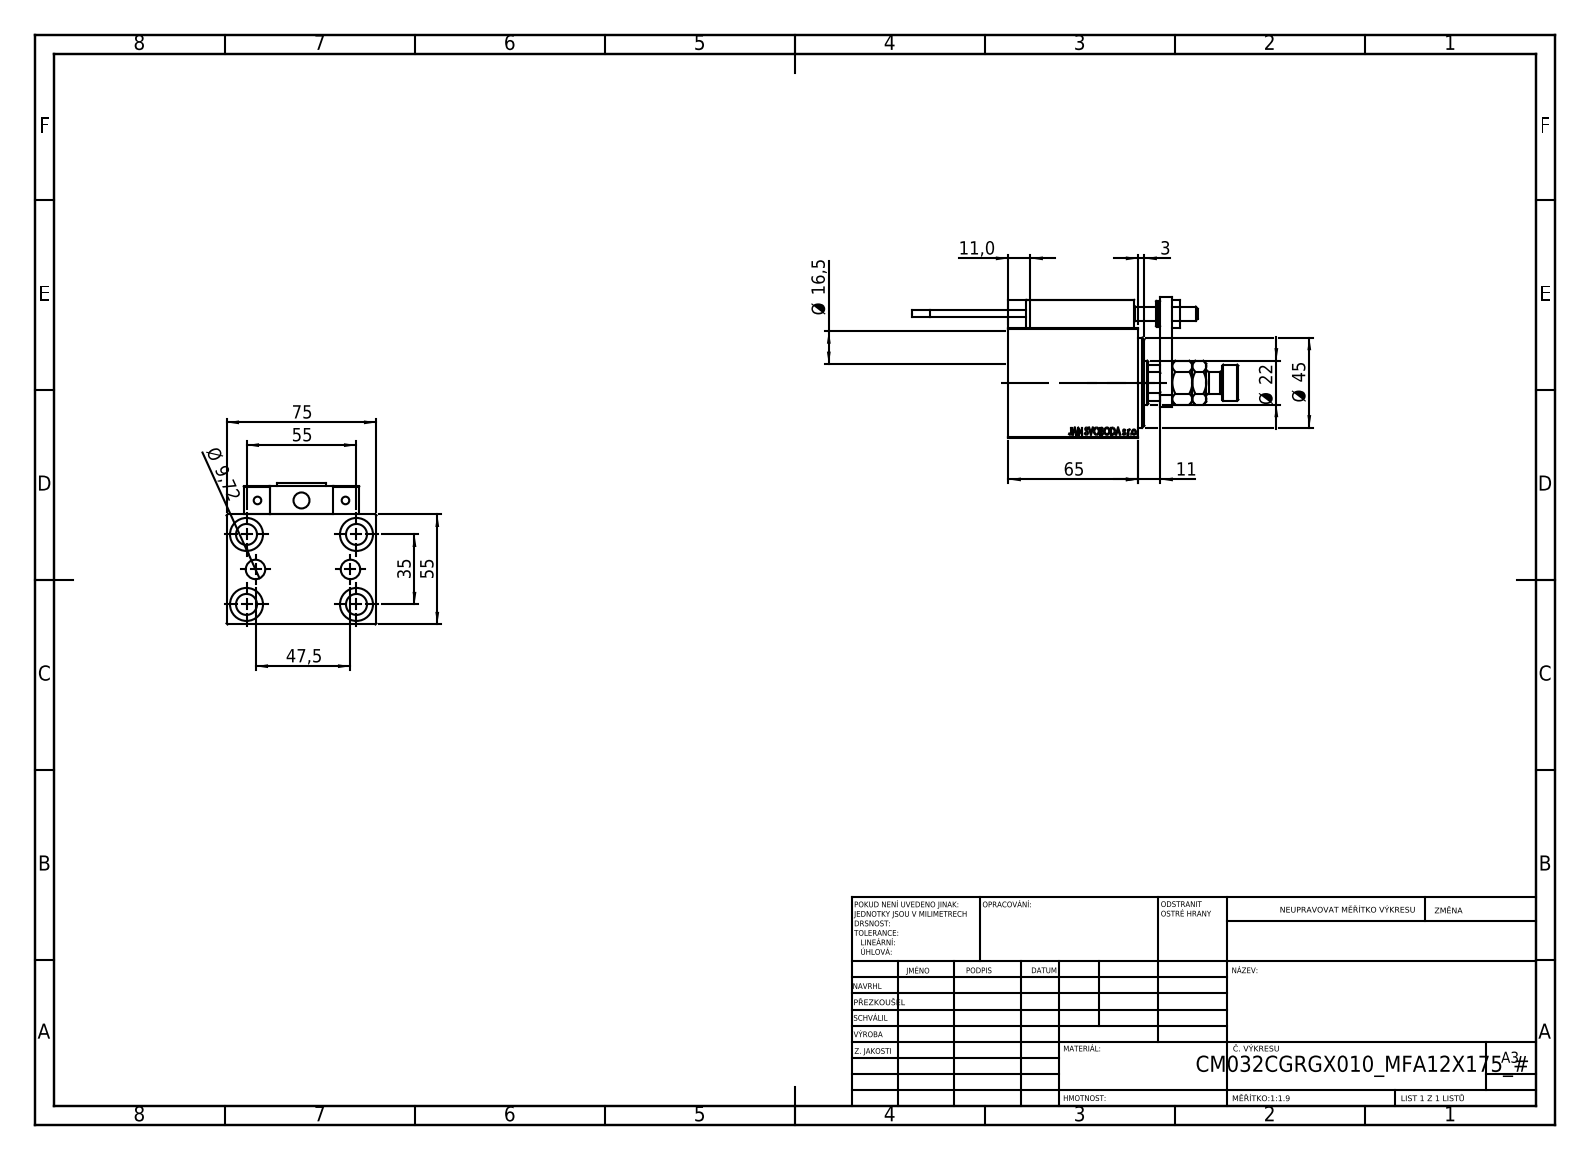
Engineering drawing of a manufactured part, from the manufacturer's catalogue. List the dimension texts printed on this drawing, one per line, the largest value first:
75
65
55
55
47,5
Ø 45
35
Ø 22
Ø 16,5
11
11,0
Ø 9,72
3
